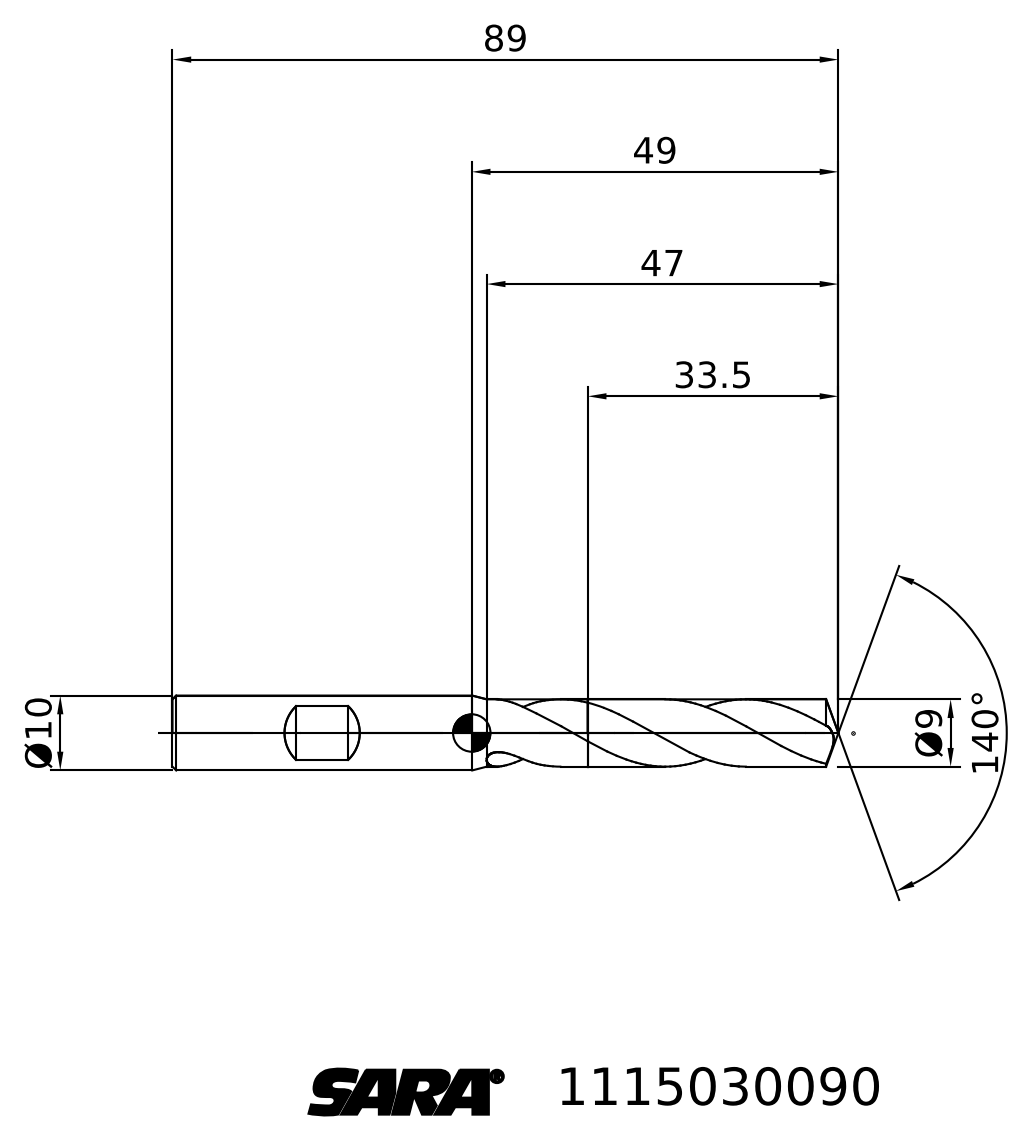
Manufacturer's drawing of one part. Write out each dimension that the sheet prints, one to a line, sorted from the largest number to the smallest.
140°
89
49
47
33.5
Ø10
Ø9
